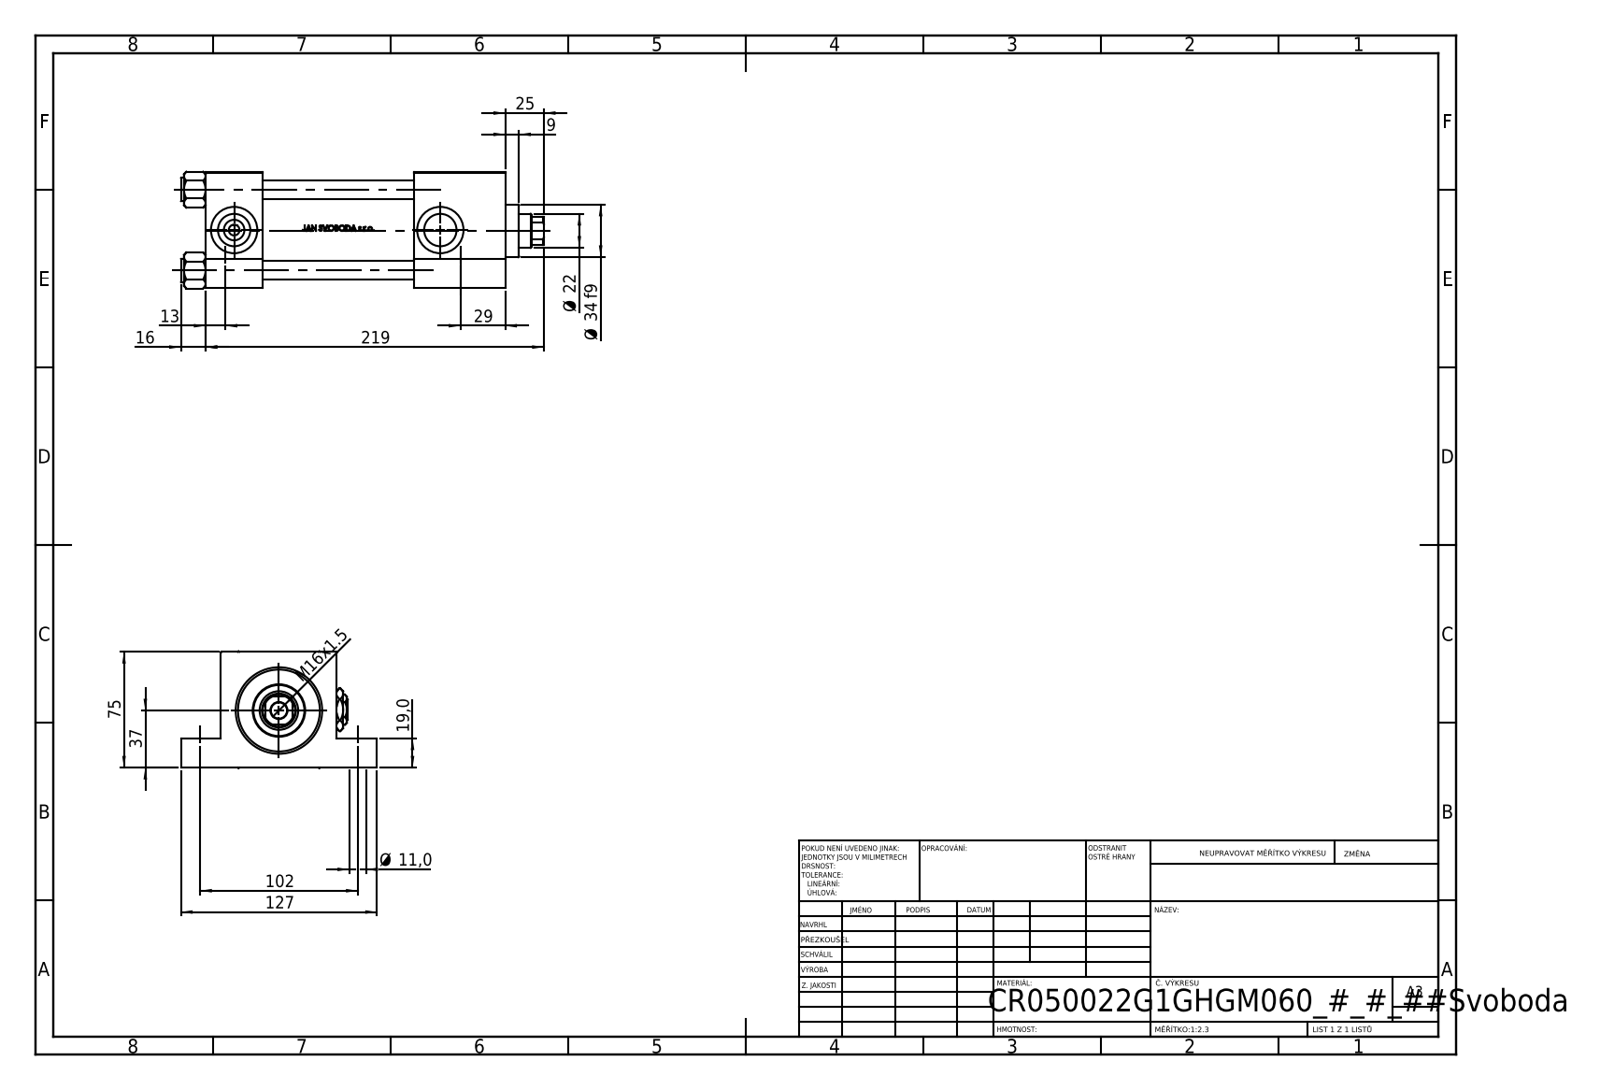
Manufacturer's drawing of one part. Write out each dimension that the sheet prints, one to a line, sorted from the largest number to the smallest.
219
127
102
75
37
Ø 34 f9
29
25
Ø 22
19,0
16
M16x1.5
13
Ø 11,0
9
